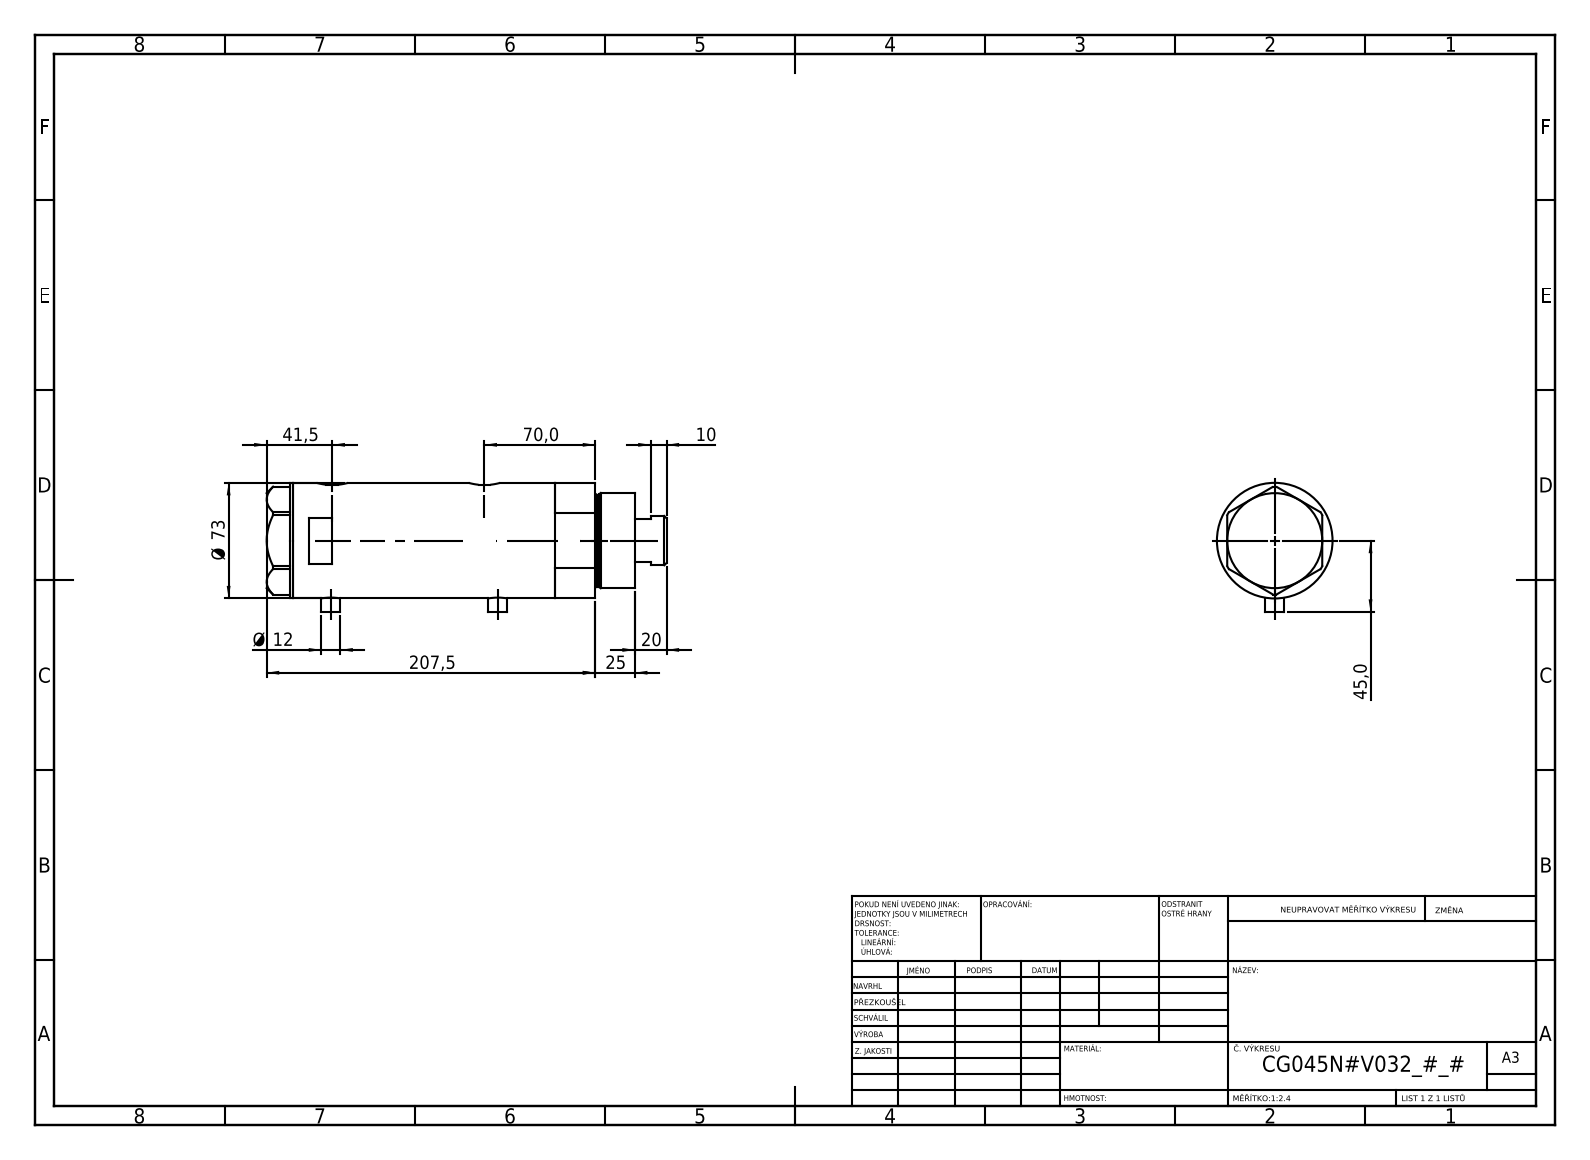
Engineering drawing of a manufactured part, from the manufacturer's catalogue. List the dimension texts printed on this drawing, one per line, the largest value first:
207,5
Ø 73
70,0
45,0
41,5
25
20
Ø 12
10
